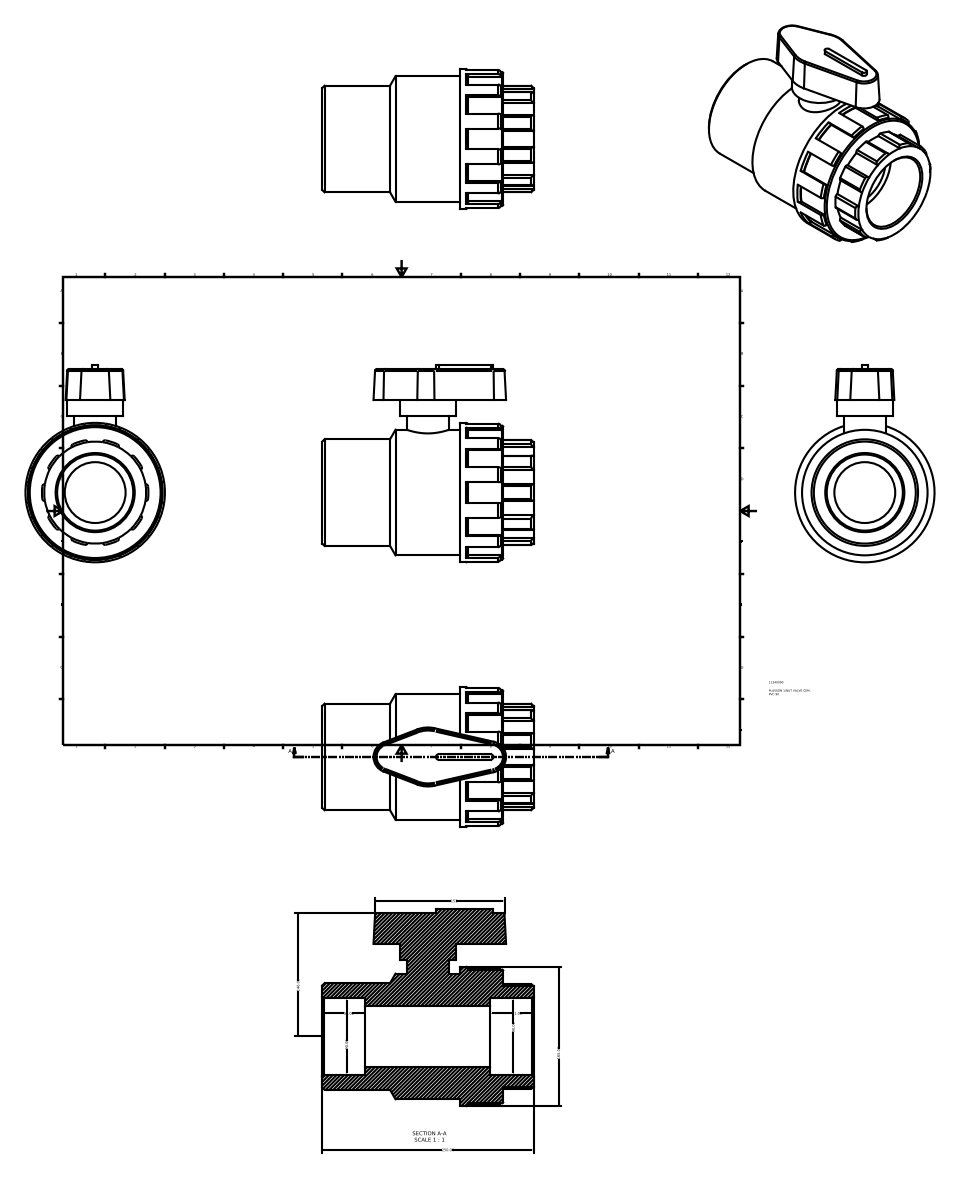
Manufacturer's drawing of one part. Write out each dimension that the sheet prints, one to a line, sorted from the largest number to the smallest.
250.00
165.00
153
146.00
90.00
90.00
51.00
51.00
